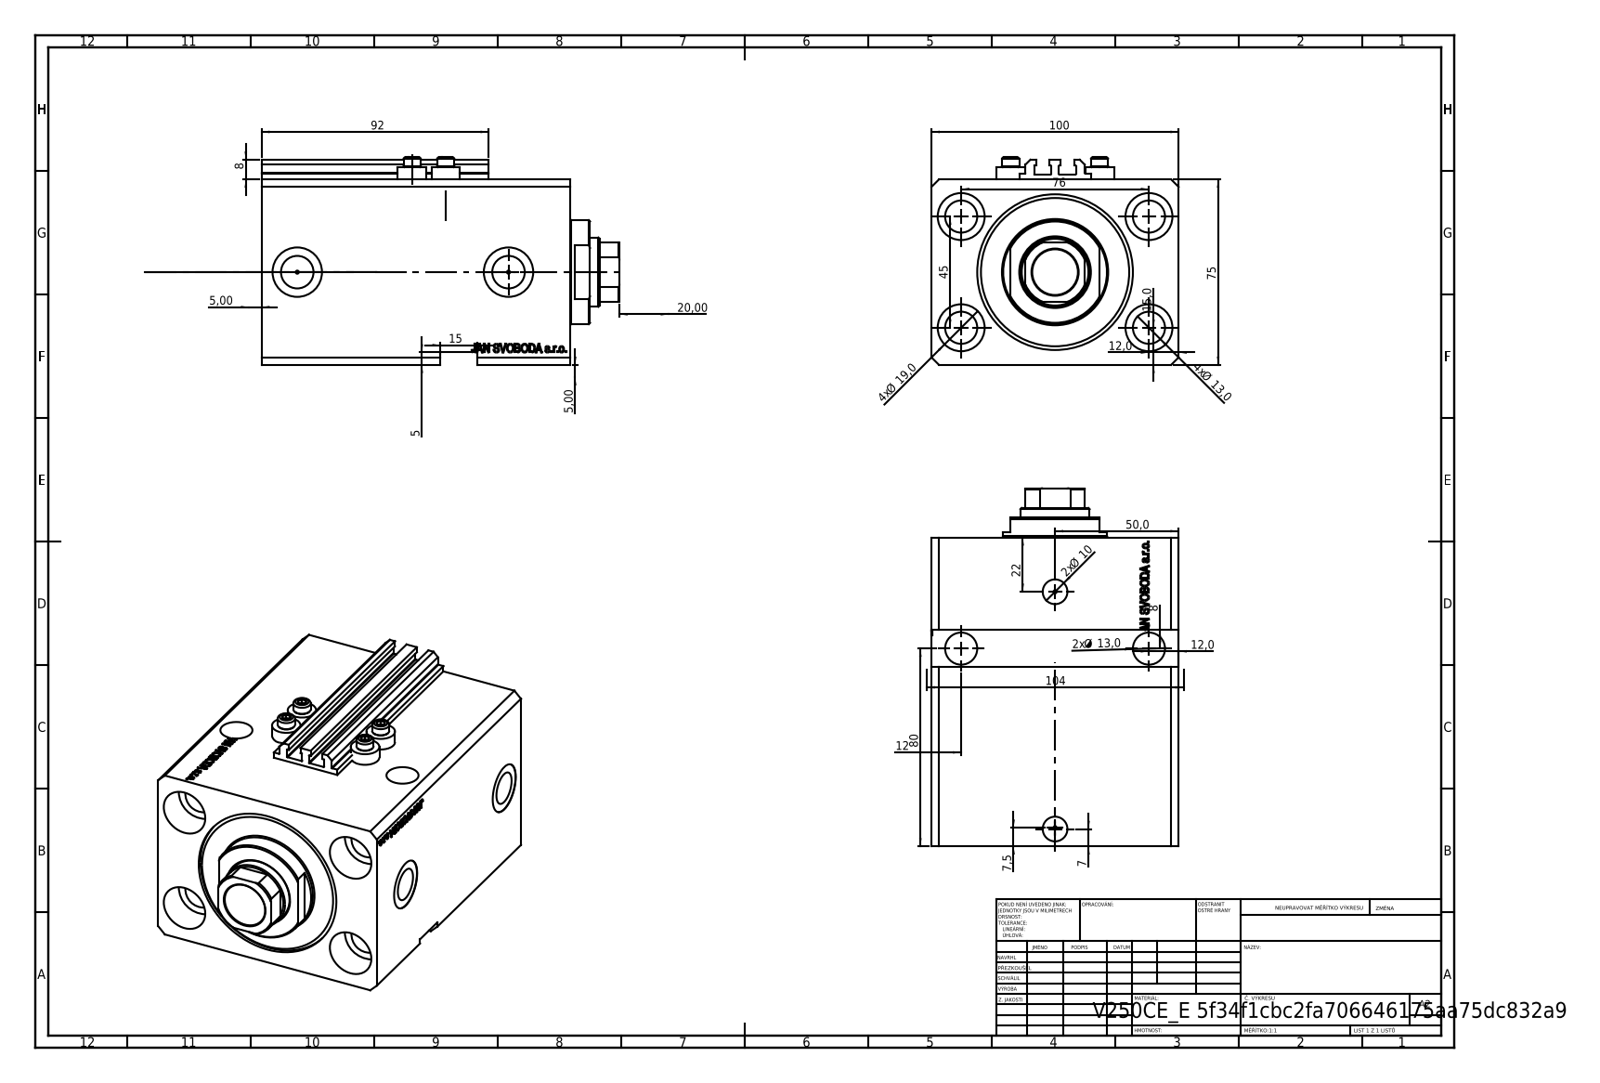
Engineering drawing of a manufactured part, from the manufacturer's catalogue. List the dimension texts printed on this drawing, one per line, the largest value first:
104
100
92
80
76
75
50,0
45
22
20,00
4x Ø 19,0
15,0
15
4x Ø 13,0
2x Ø 13,0
12,0
12,0
12
2x Ø 10
8
8
7,5
7
5,00
5,00
5
